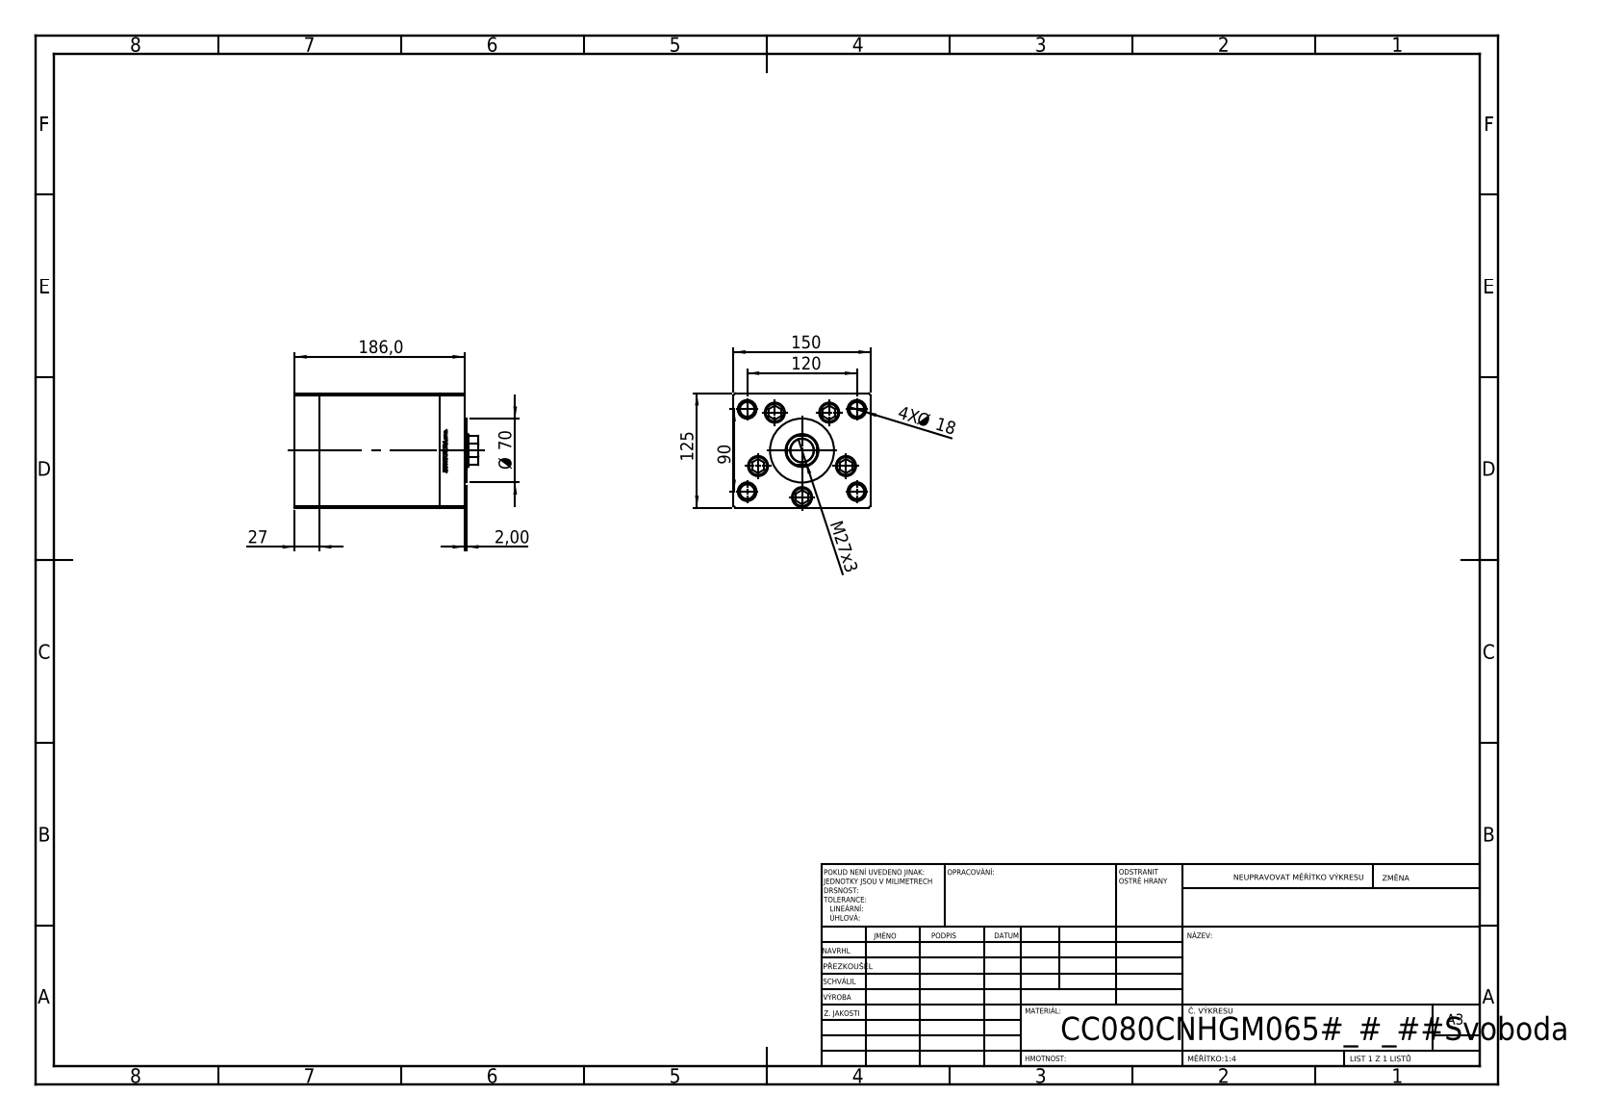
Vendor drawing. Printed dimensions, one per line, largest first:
186,0
150
125
120
90
Ø 70
27
M27x3
4X Ø 18
2,00
